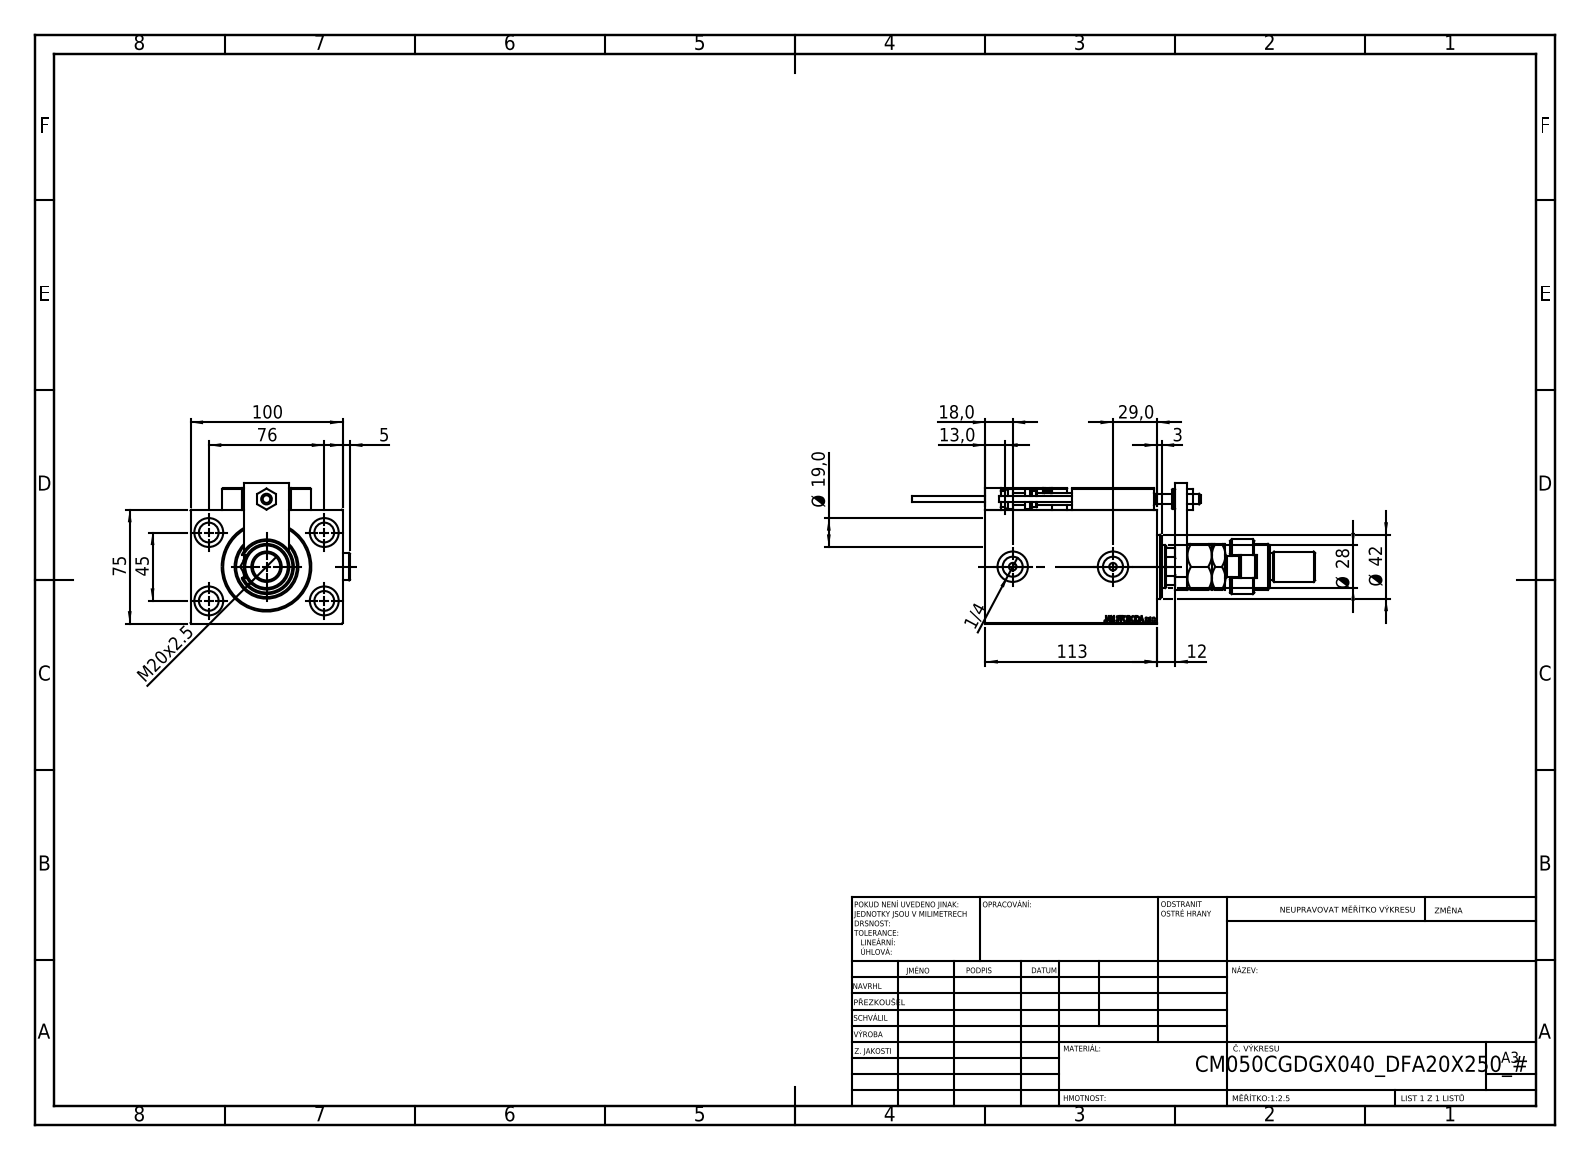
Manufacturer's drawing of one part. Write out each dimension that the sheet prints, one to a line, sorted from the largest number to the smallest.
113
100
76
75
45
Ø 42
29,0
Ø 28
M20x2.5
Ø 19,0
18,0
13,0
12
5
3
1/4
